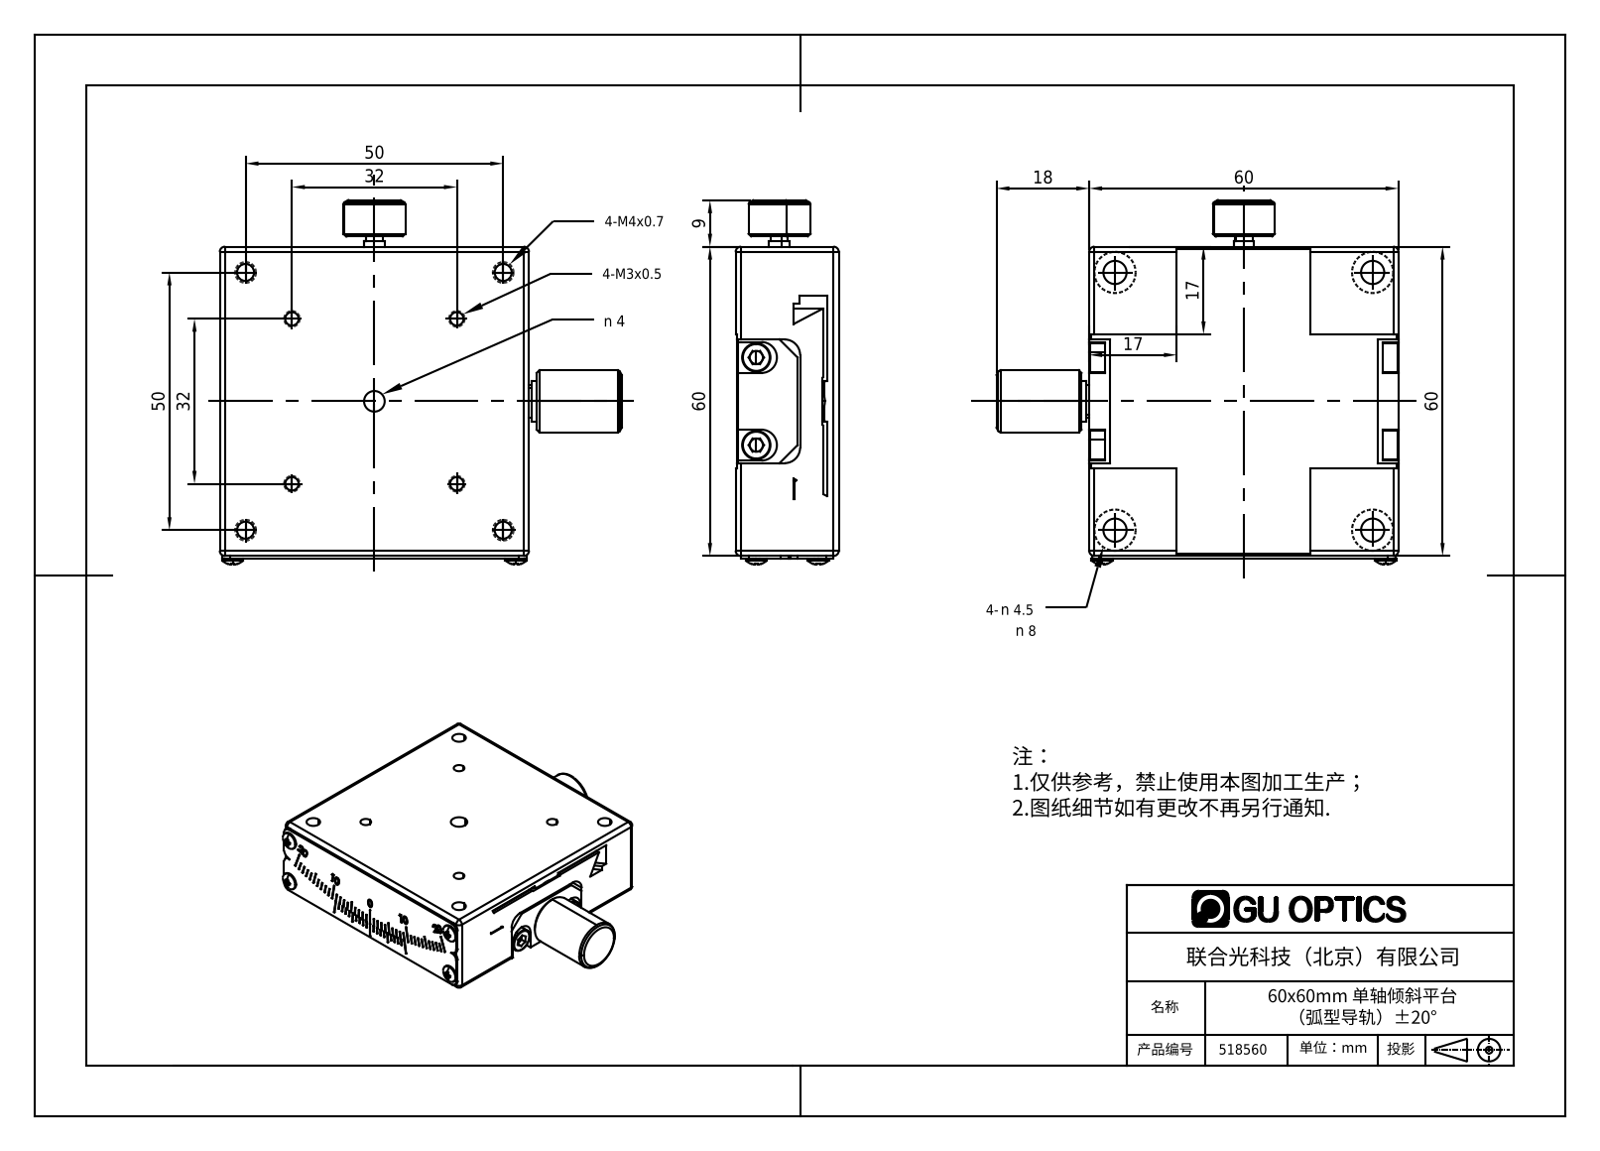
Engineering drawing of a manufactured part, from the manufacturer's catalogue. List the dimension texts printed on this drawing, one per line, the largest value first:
60
60
60
50
50
32
32
18
17
17
9
